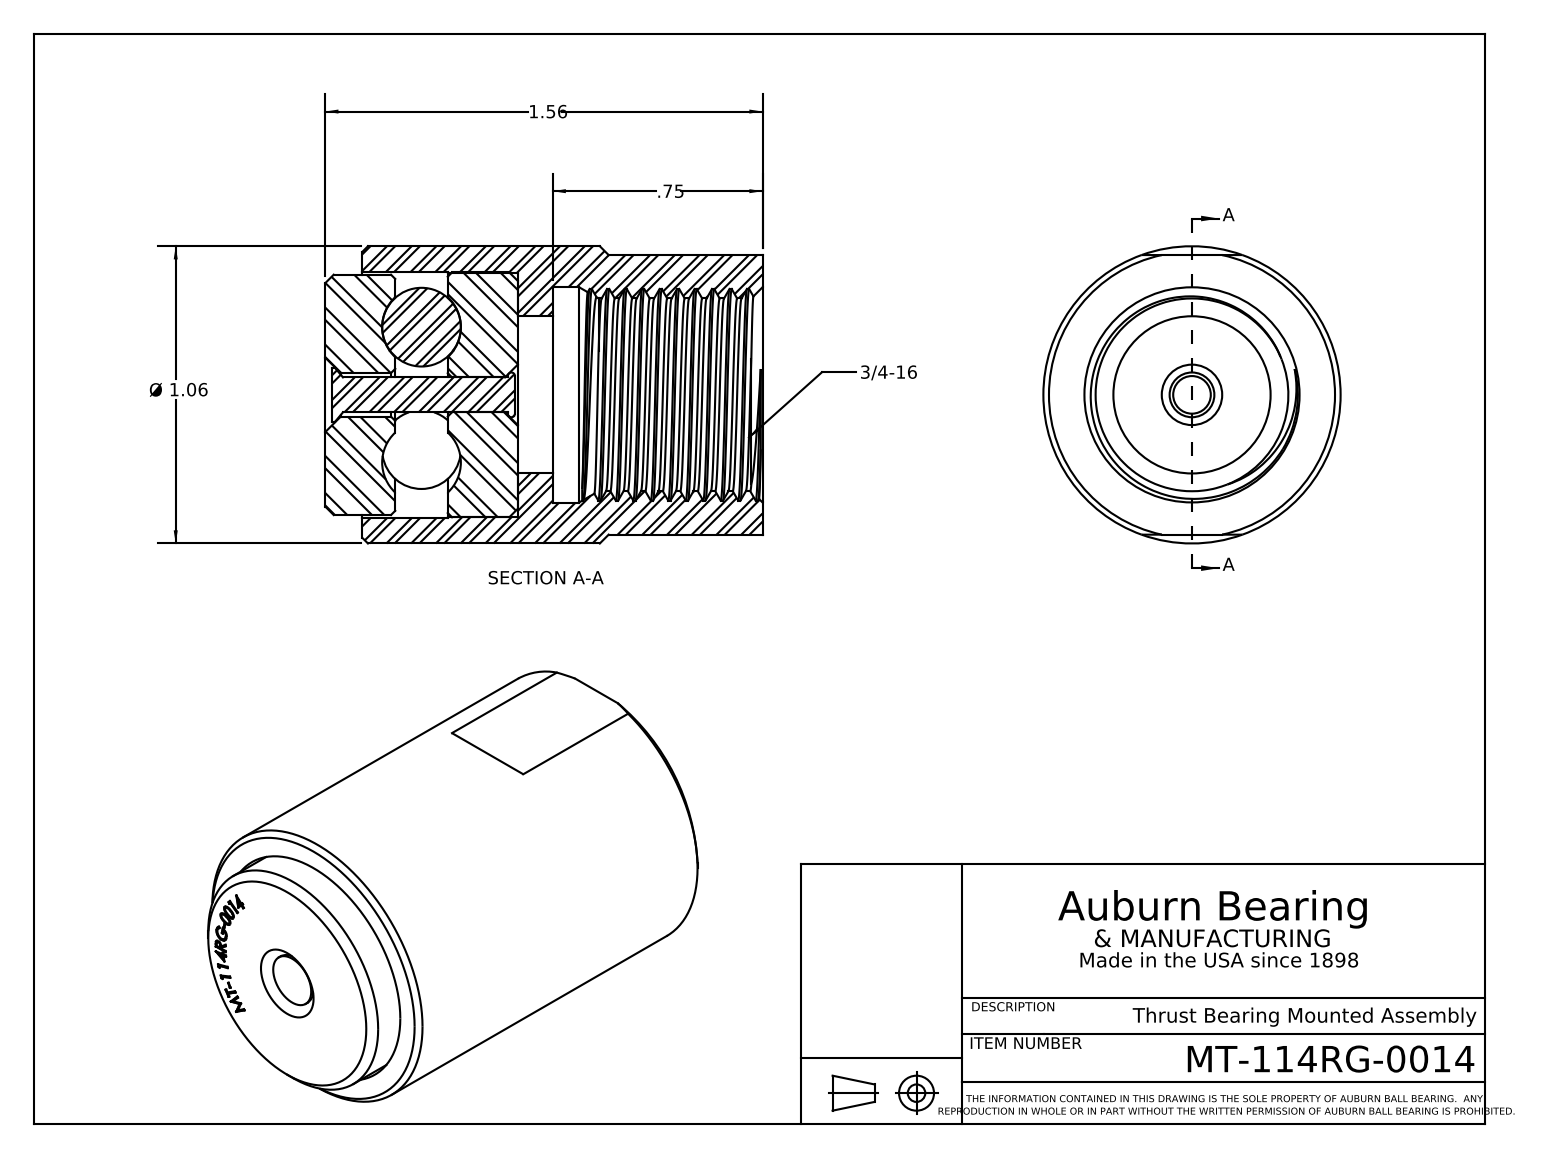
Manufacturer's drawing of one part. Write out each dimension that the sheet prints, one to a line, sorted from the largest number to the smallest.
1.56
Ø 1.06
.75
